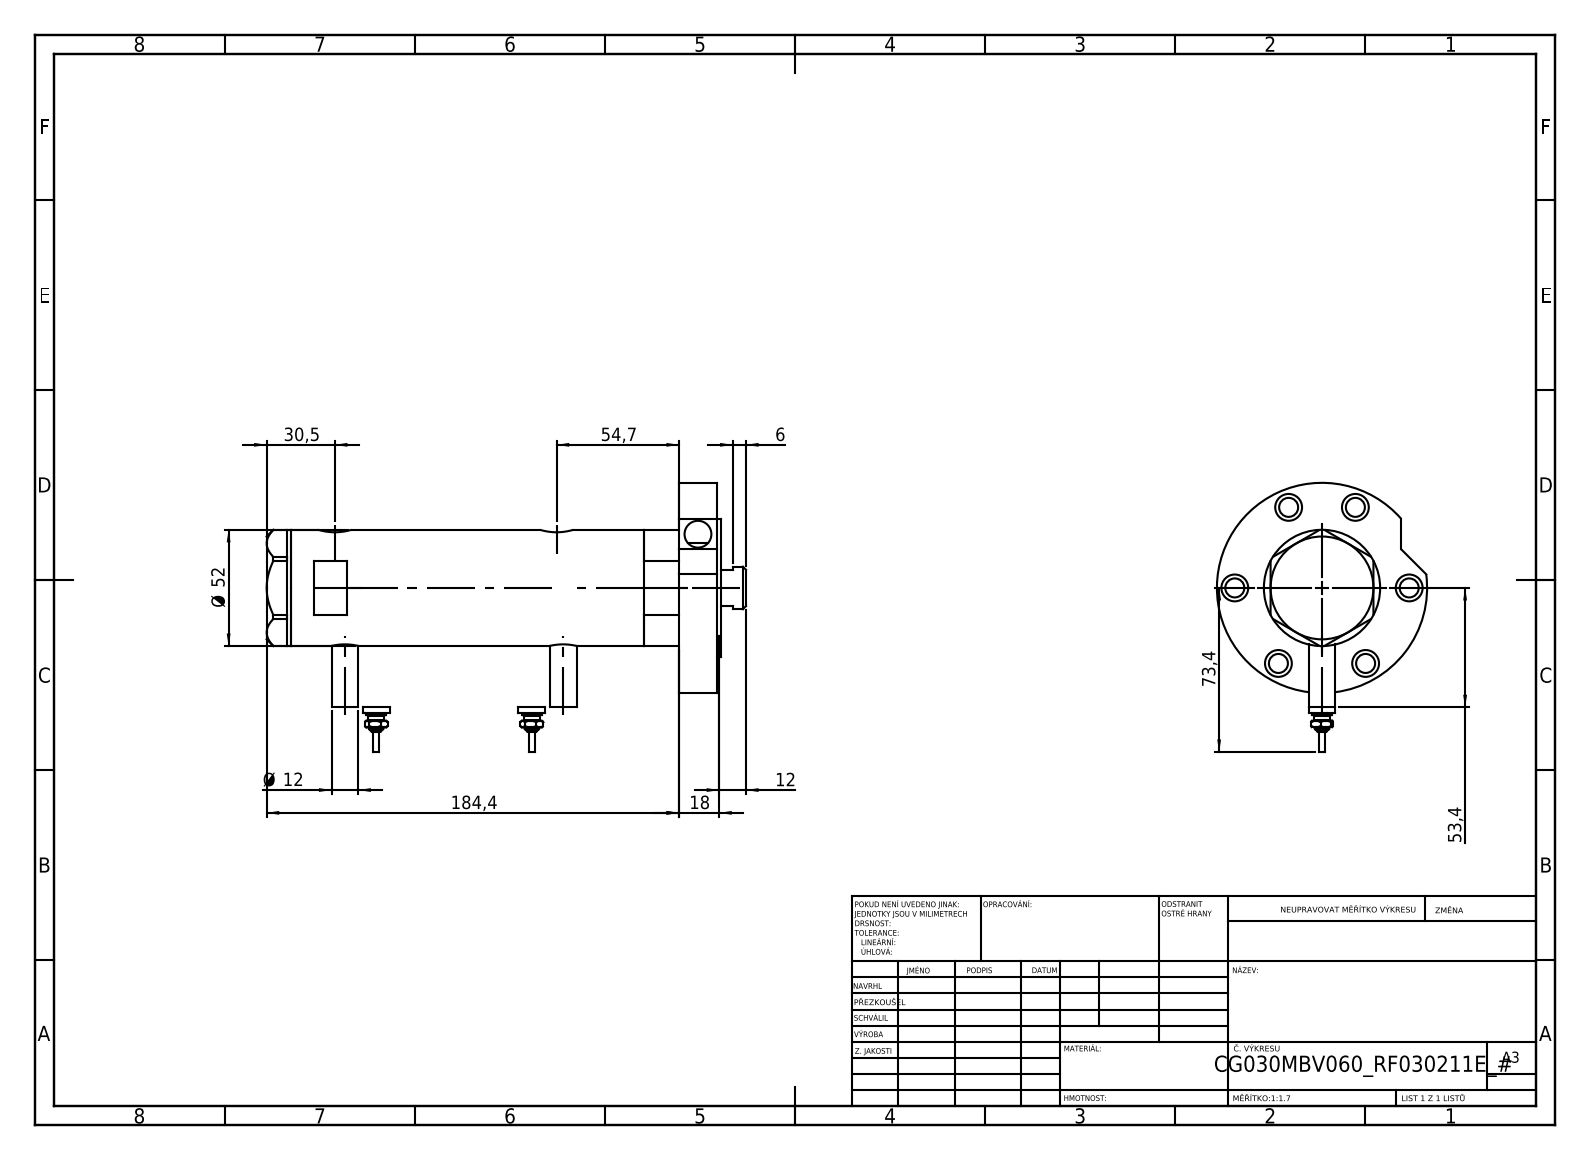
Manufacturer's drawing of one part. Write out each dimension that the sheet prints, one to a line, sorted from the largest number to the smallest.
184,4
73,4
54,7
53,4
Ø 52
30,5
18
12
Ø 12
6
